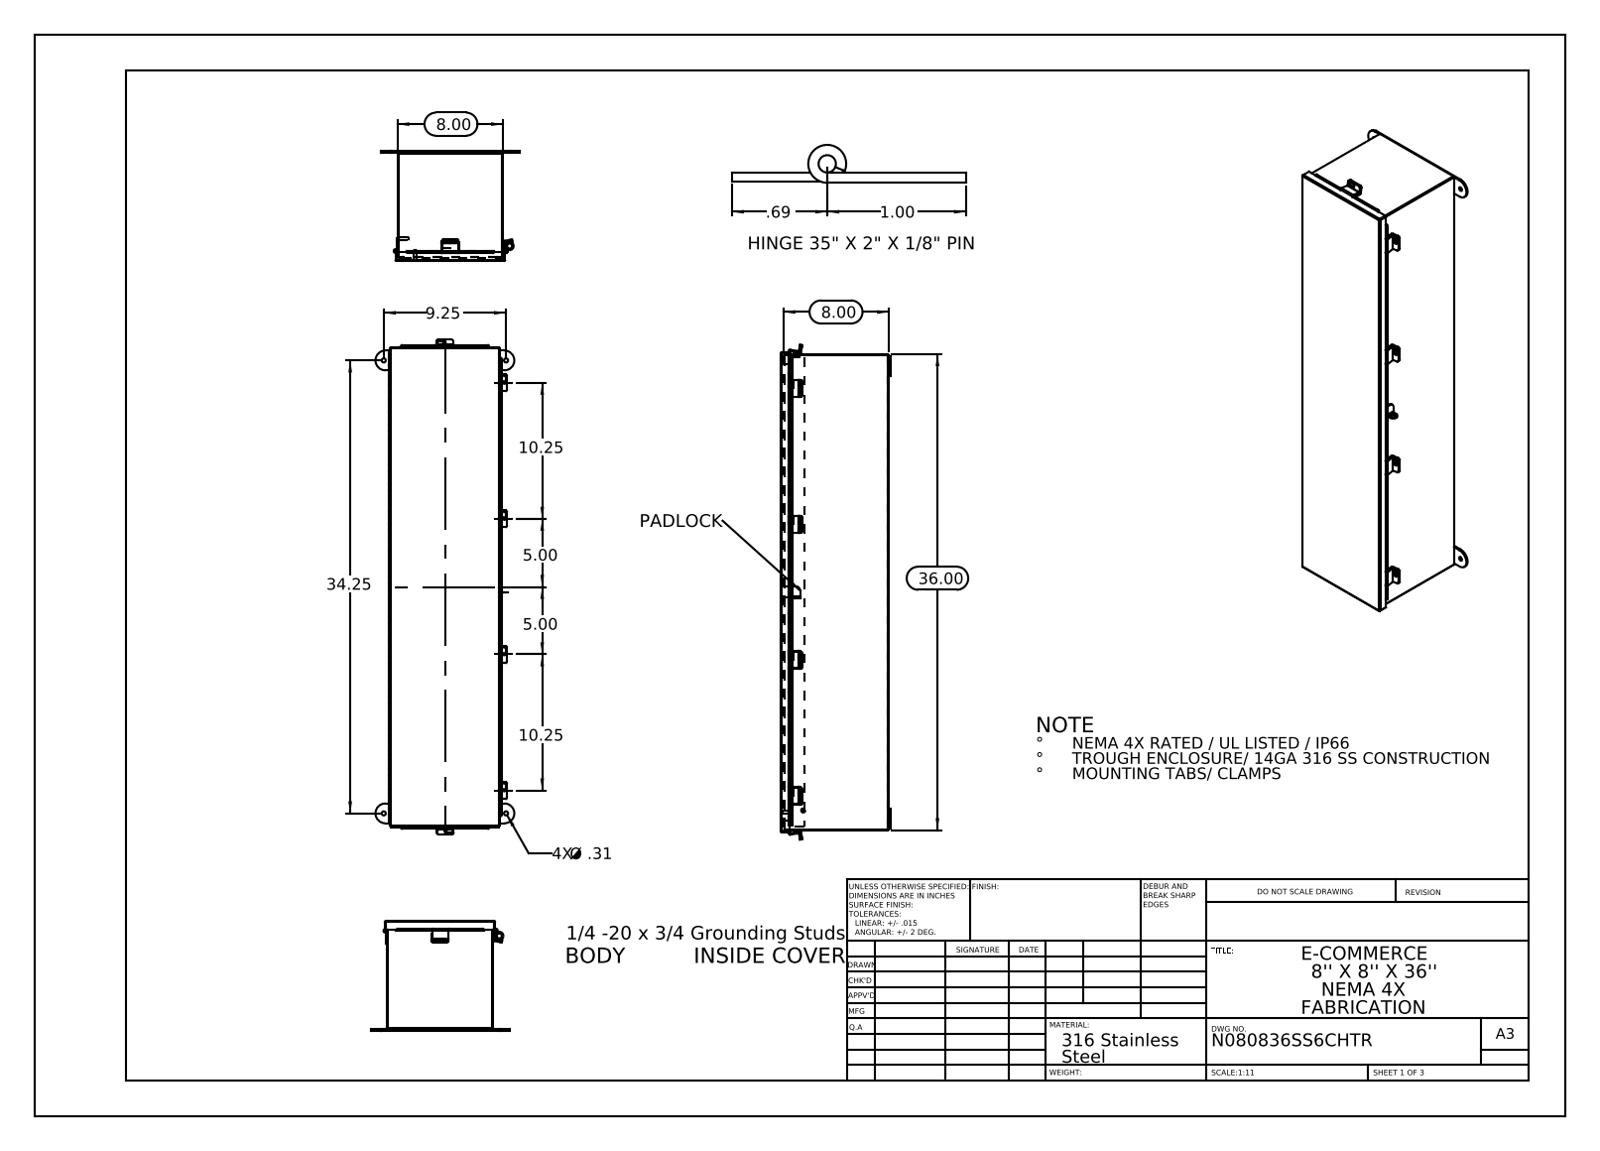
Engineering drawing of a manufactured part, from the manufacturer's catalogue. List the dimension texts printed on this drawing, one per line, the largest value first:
36.00
34.25
10.25
10.25
9.25
8.00
8.00
5.00
5.00
1.00
.69
4X Ø .31
